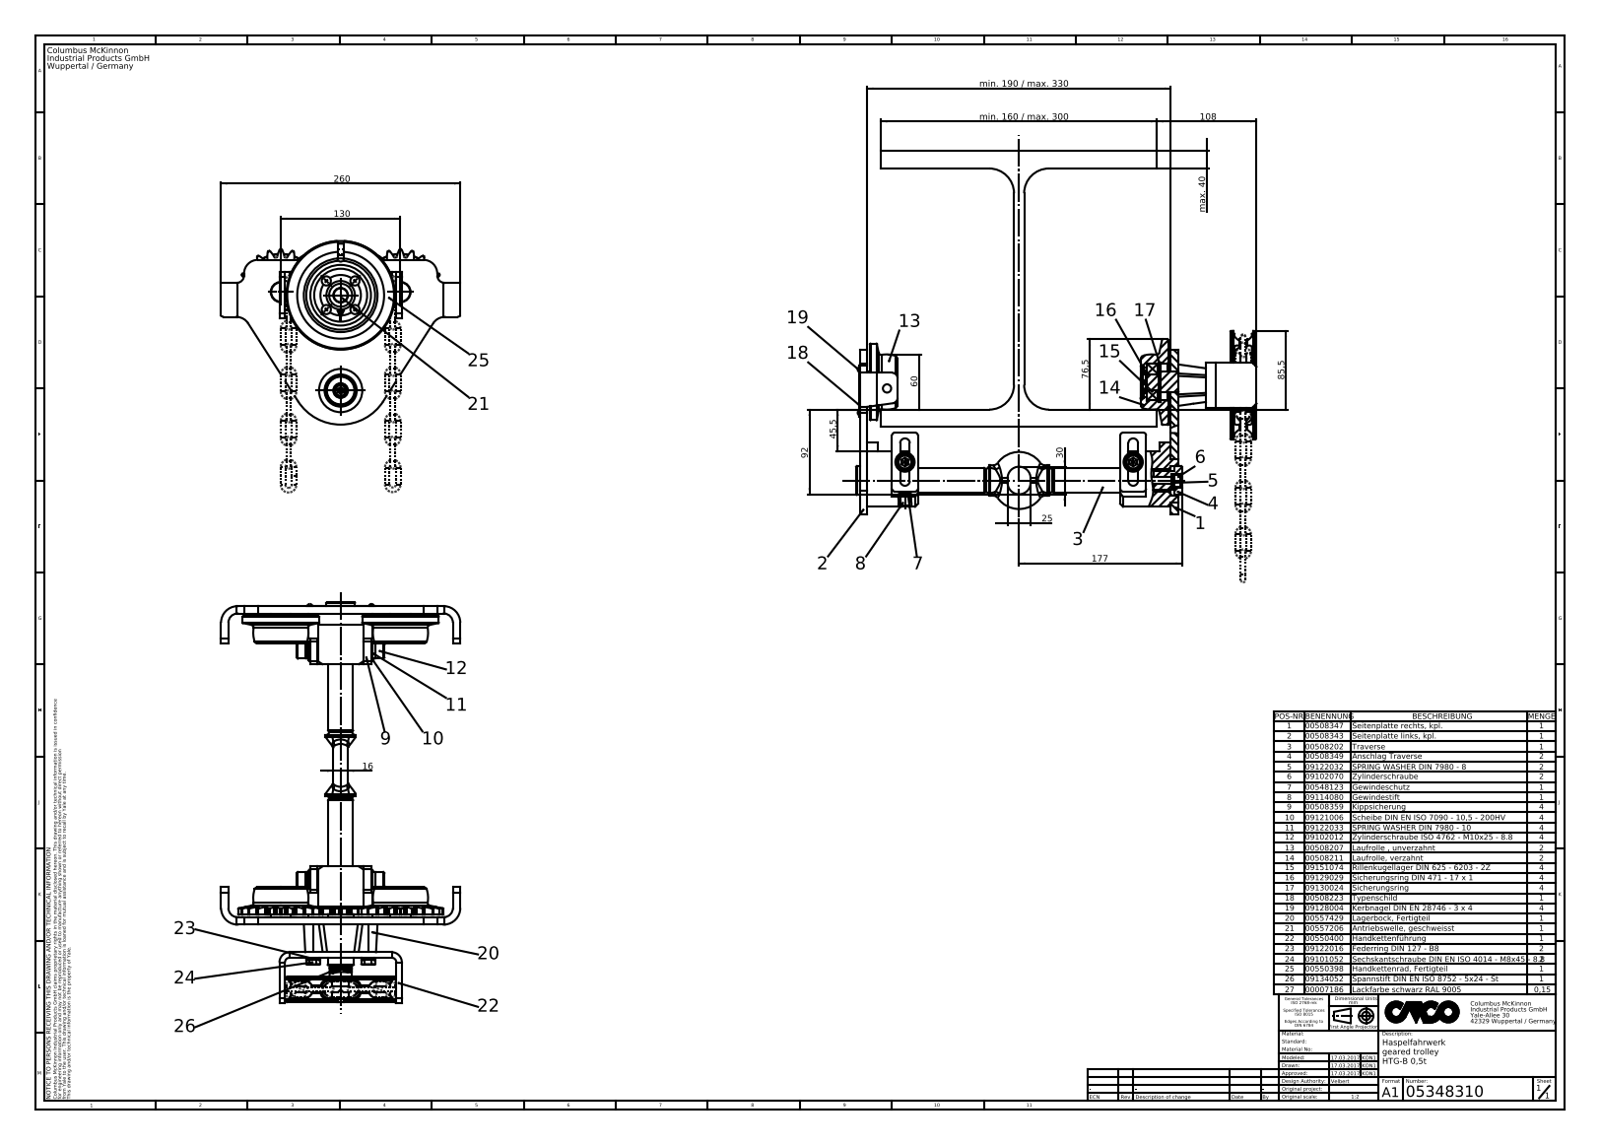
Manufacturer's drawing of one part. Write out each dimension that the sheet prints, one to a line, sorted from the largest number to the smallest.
260
min. 190 / max. 330
177
min. 160 / max. 300
130
108
92
85,5
76,5
60
45,5
max. 40
30
25
16
